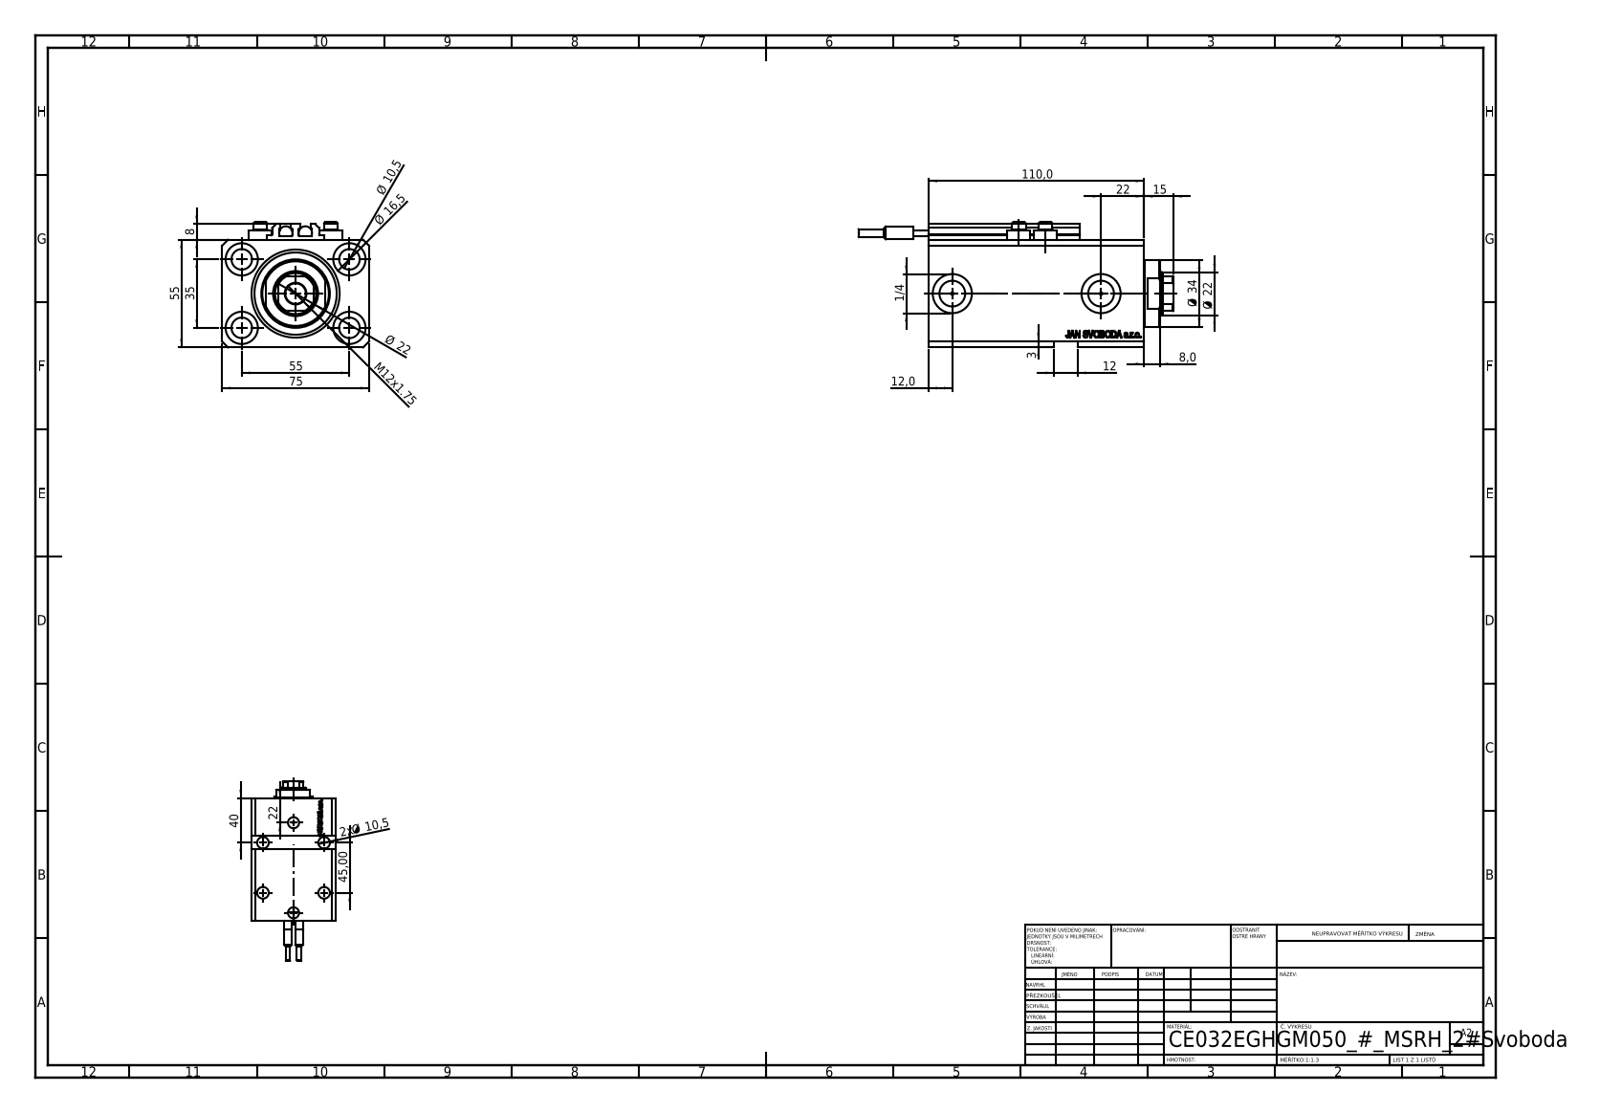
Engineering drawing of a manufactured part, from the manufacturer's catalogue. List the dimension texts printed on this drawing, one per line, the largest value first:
110,0
75
55
55
45,00
40
35
Ø 34
Ø 22
22
Ø 22
22
Ø 16,5
15
M12x1.75
12,0
12
Ø 10,5
2x Ø 10,5
8
8,0
3
1/4
